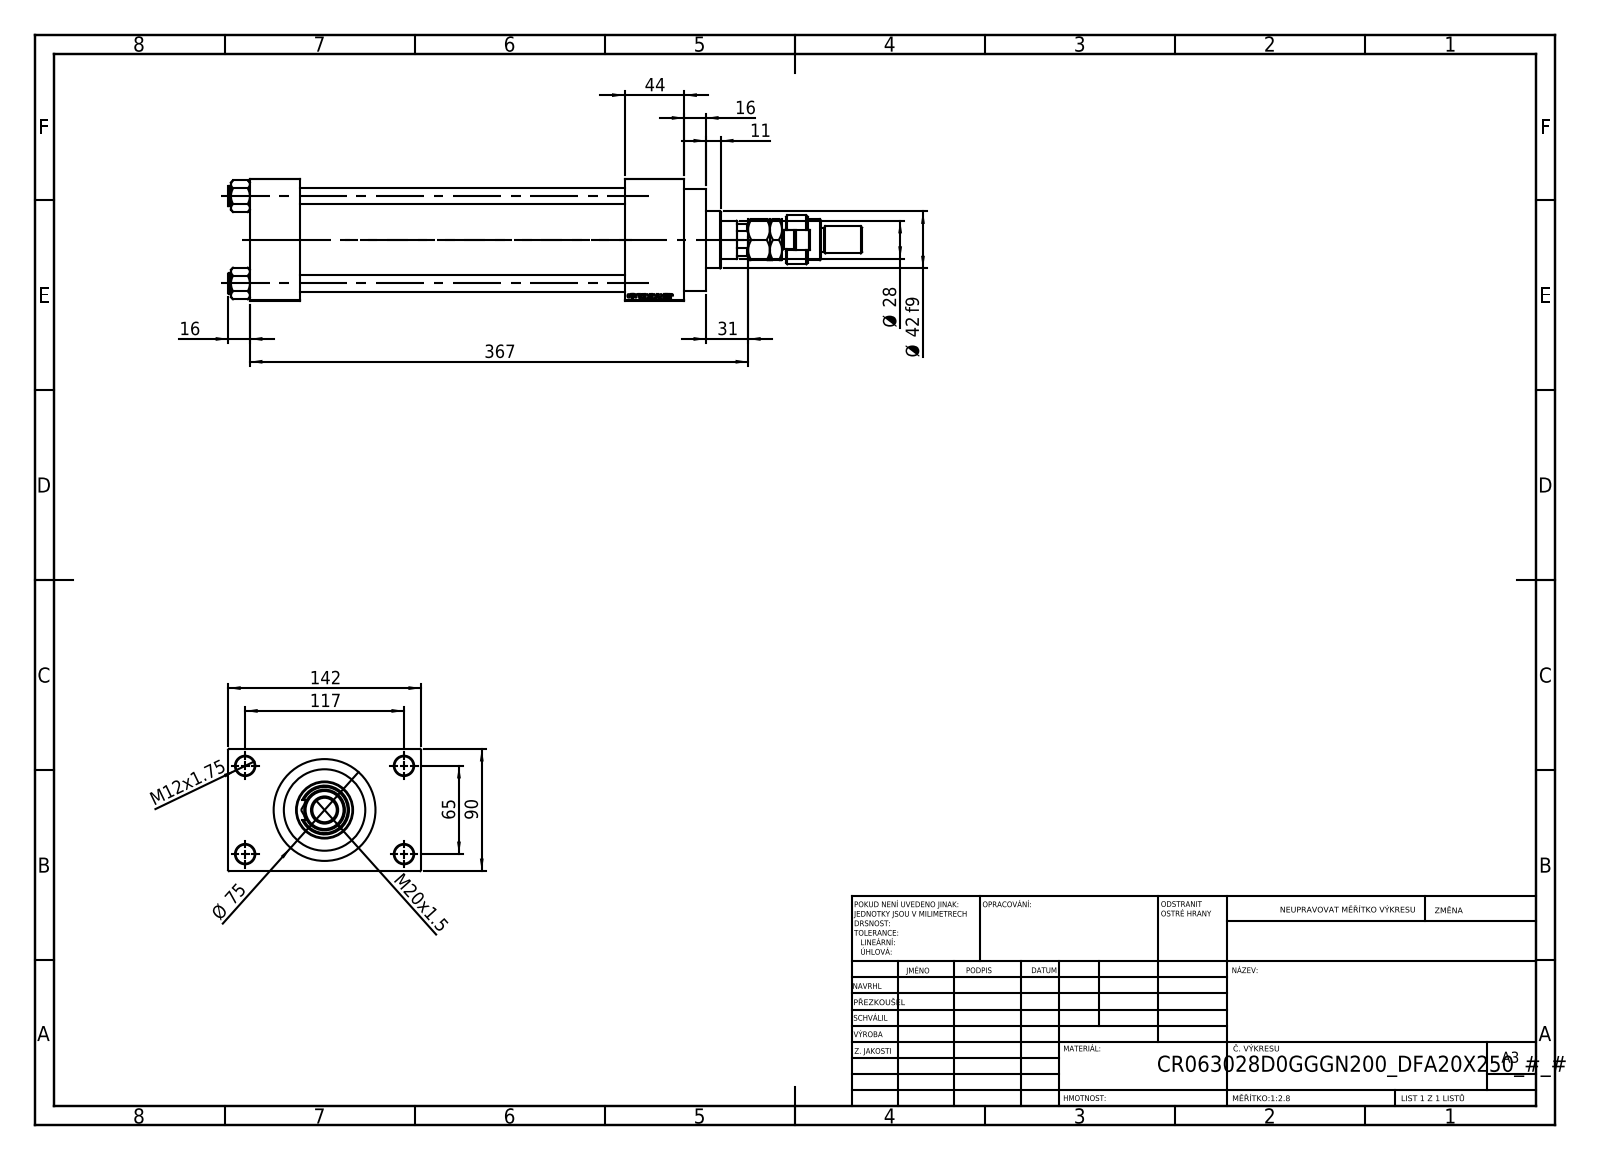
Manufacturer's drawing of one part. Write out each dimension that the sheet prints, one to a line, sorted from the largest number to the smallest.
367
142
117
90
Ø 75
65
44
Ø 42 f9
31
Ø 28
M20x1.5
16
16
M12x1.75
11
